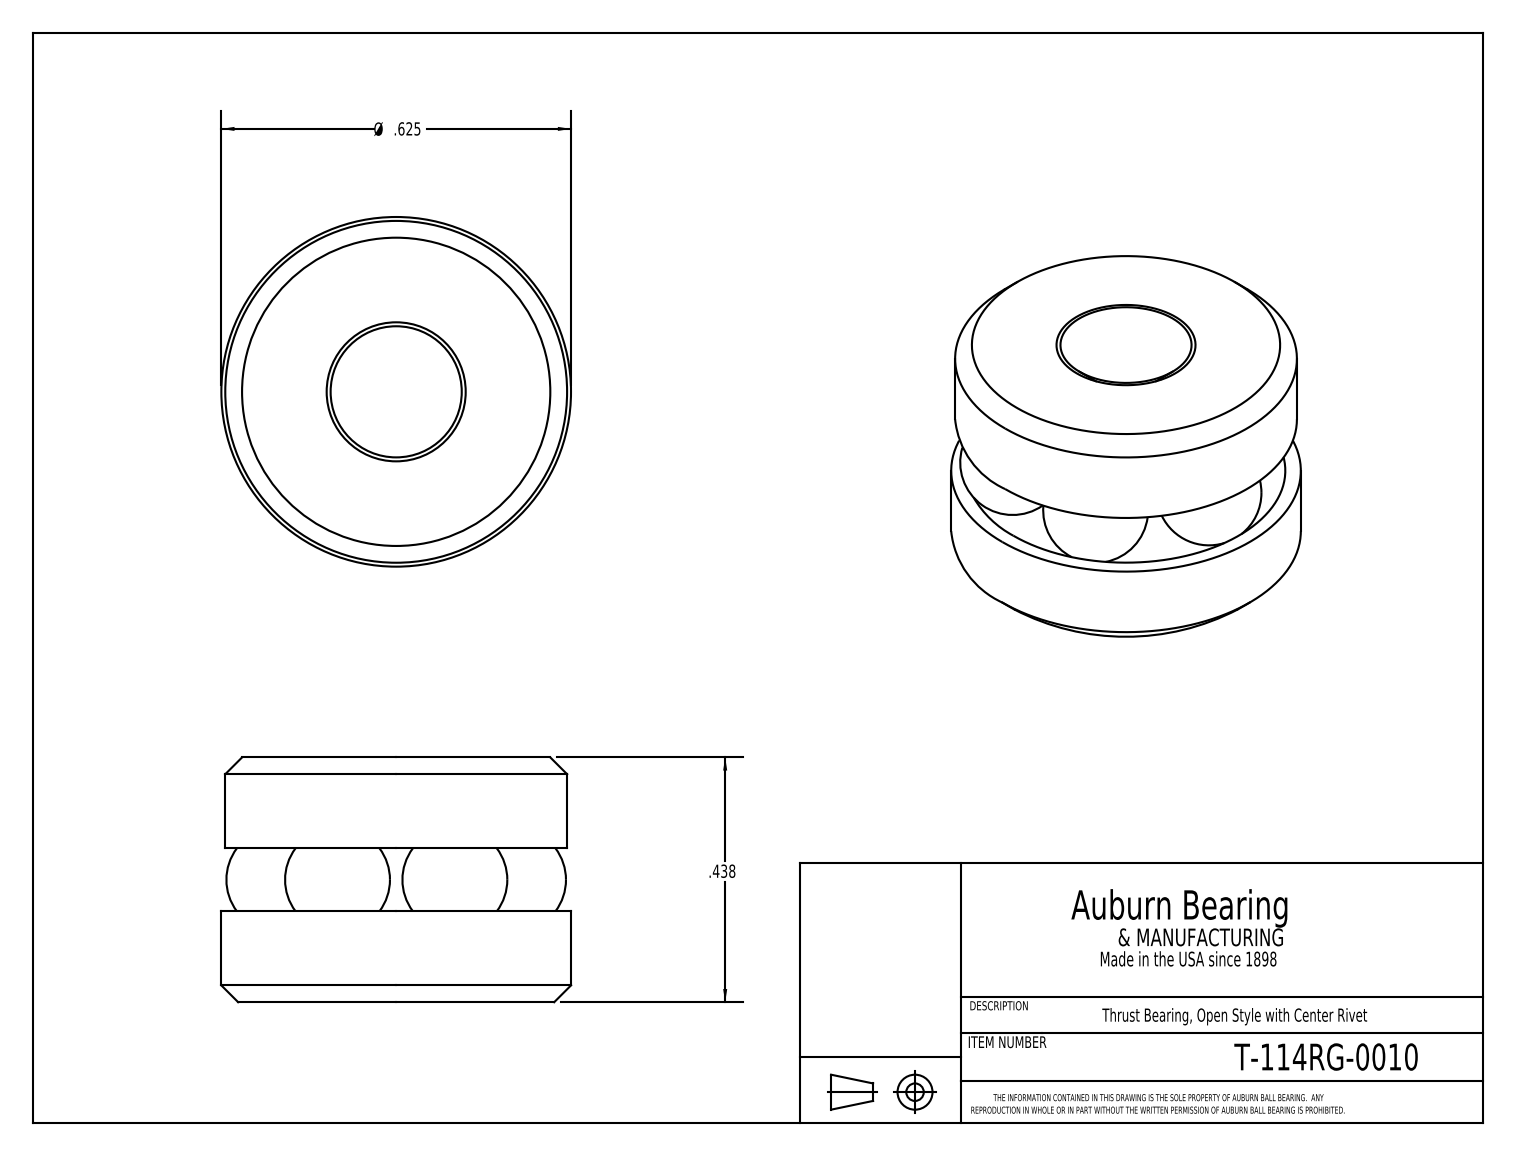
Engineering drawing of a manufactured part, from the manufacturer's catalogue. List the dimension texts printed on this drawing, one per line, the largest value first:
Ø .625
.438
